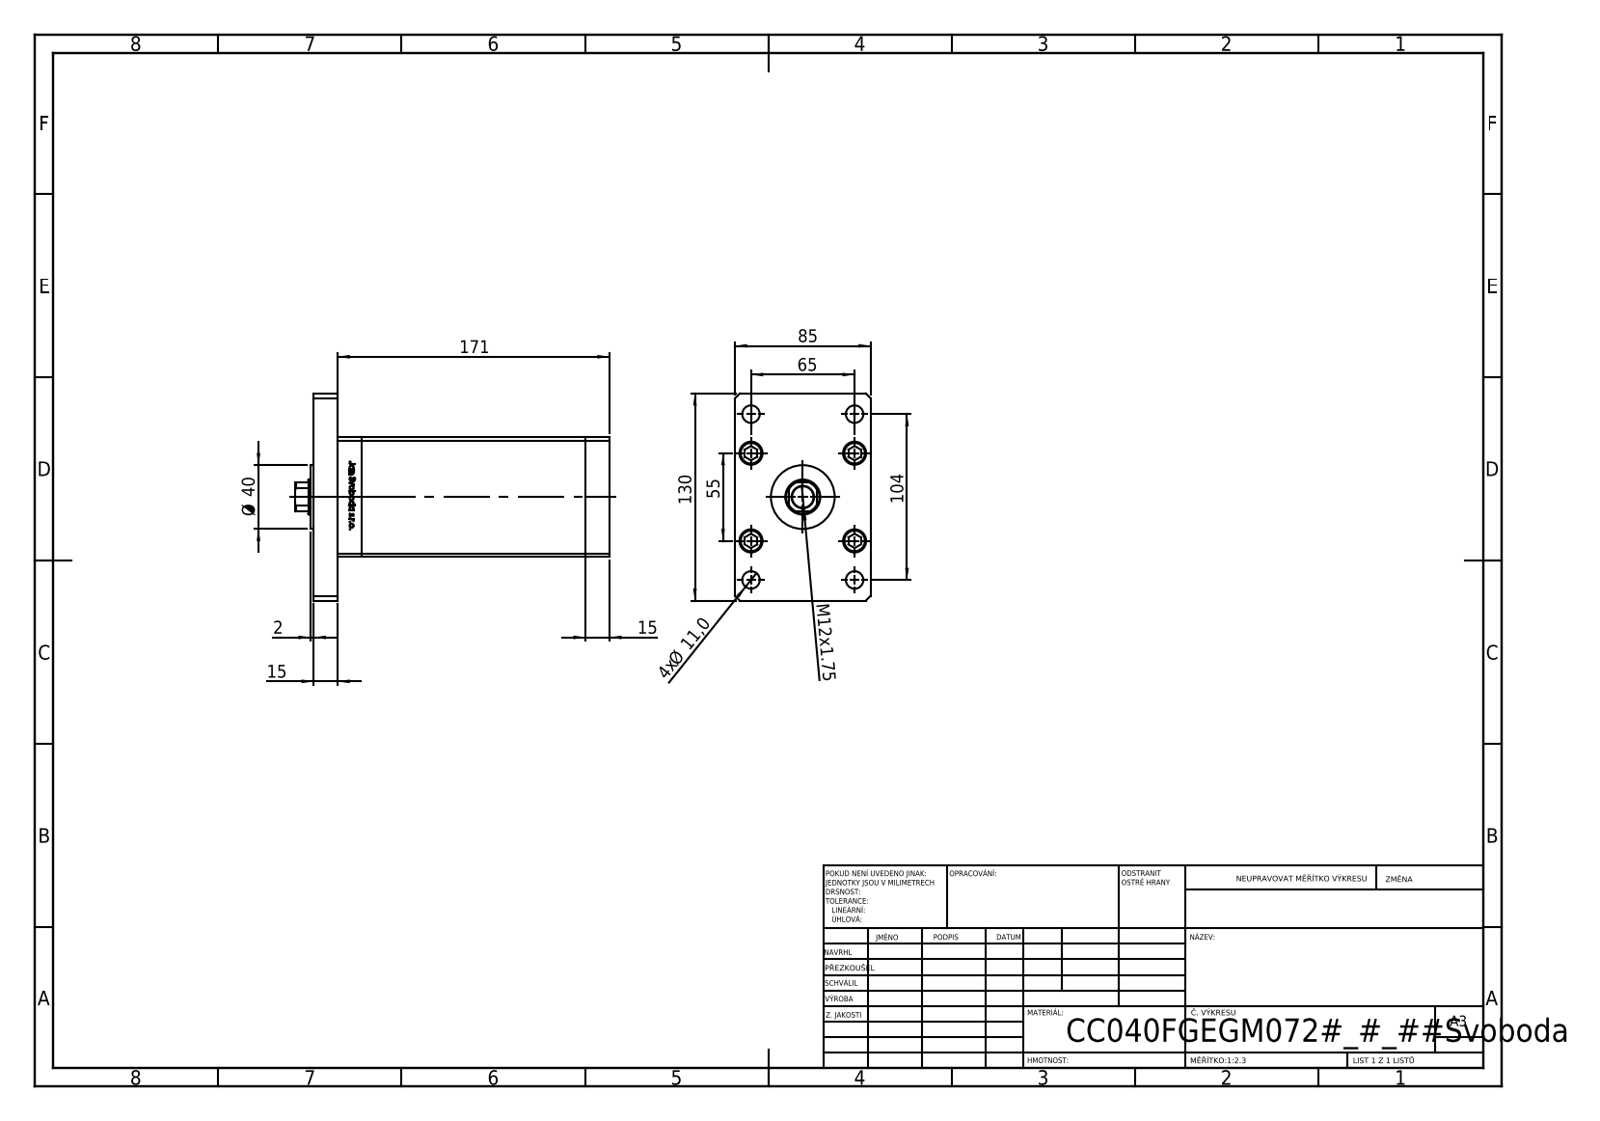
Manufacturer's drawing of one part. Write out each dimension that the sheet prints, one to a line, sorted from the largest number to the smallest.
171
130
104
85
65
55
Ø 40
15
15
M12x1.75
4x Ø 11,0
2
